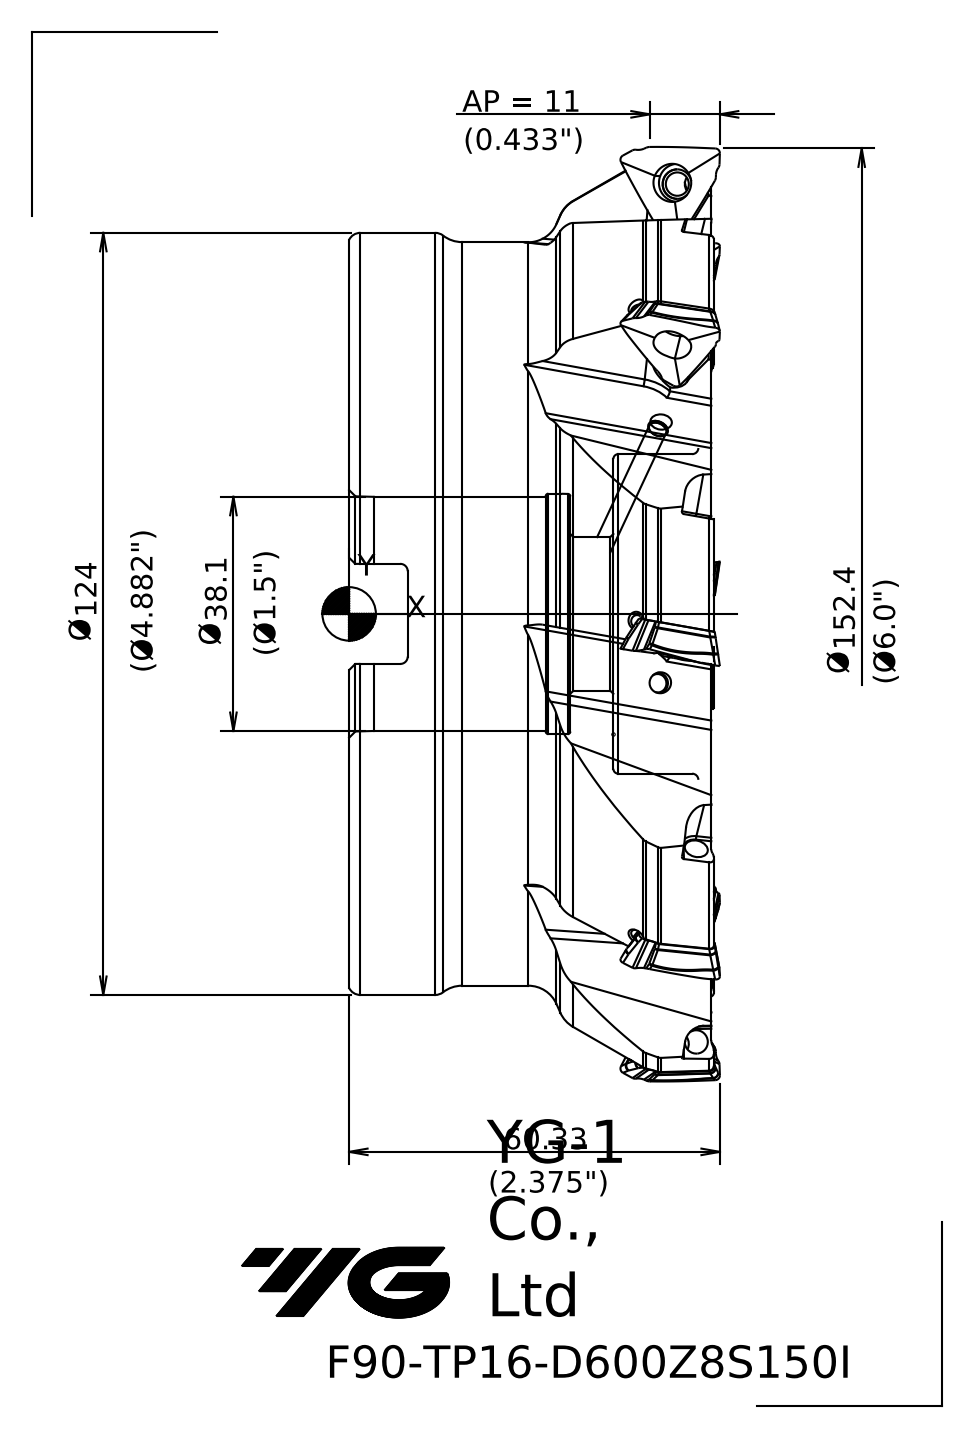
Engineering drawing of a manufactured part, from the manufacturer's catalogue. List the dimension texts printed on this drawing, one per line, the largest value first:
152.4 Ø
124 Ø
60.33
38.1 Ø
AP = 11
